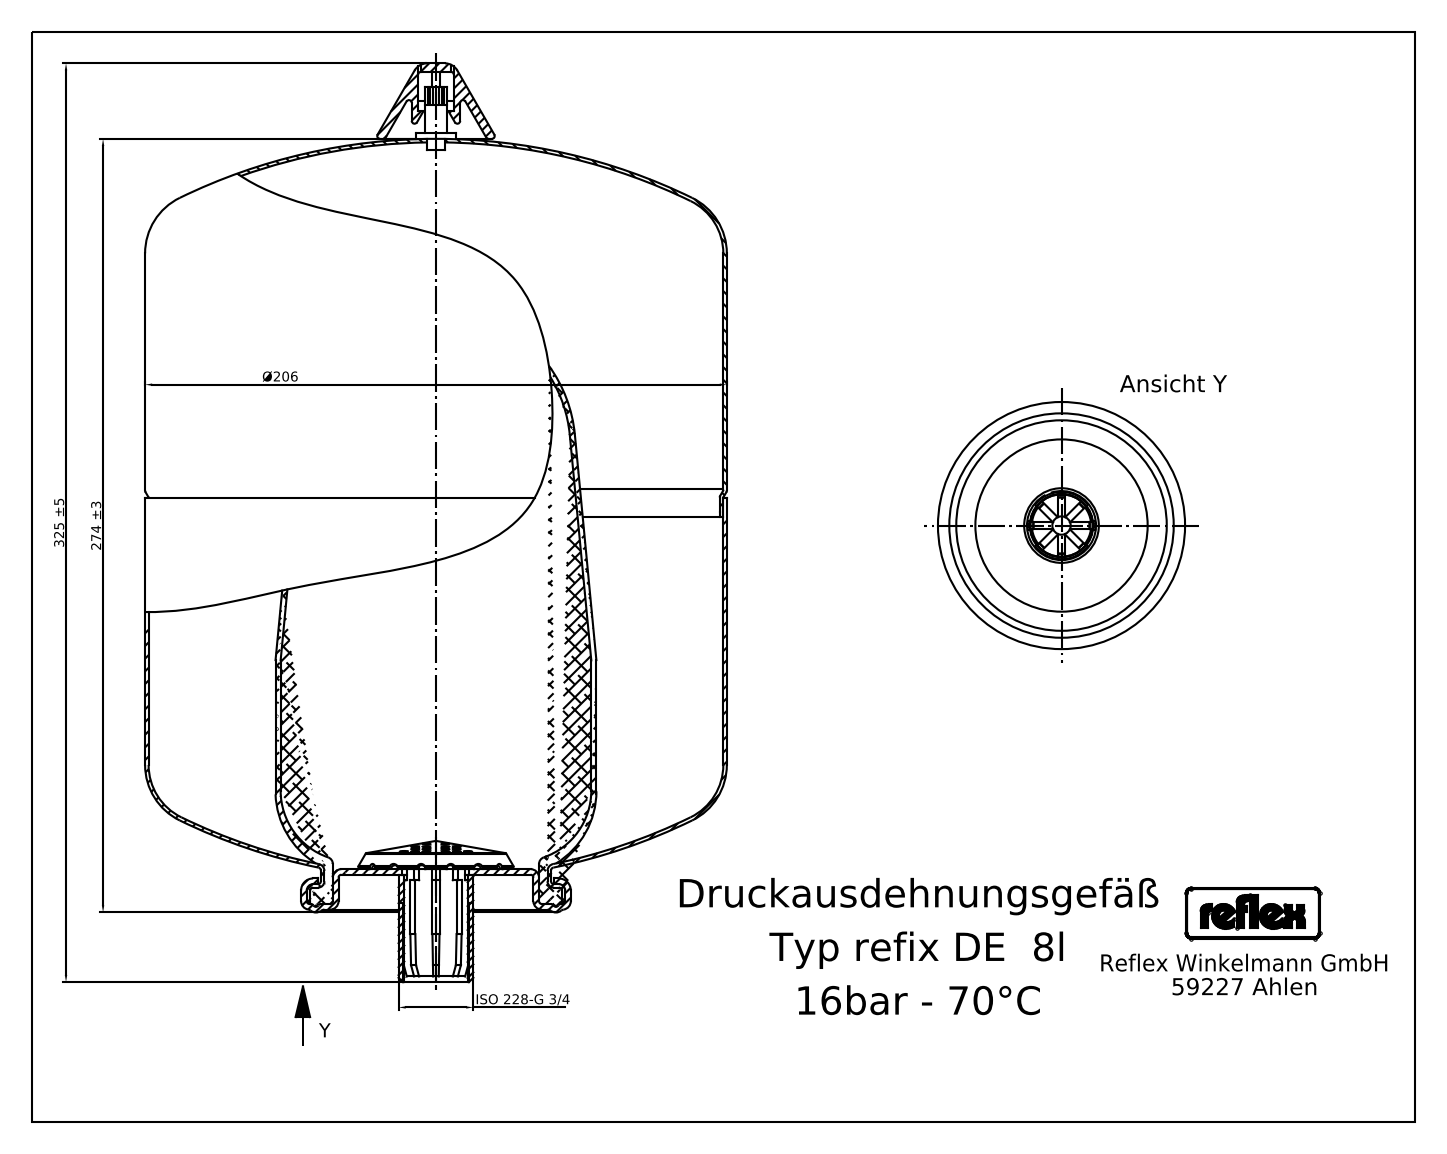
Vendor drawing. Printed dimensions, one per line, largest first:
325 ±5
274 ±3
ISO 228-G 3/4
Ø206
